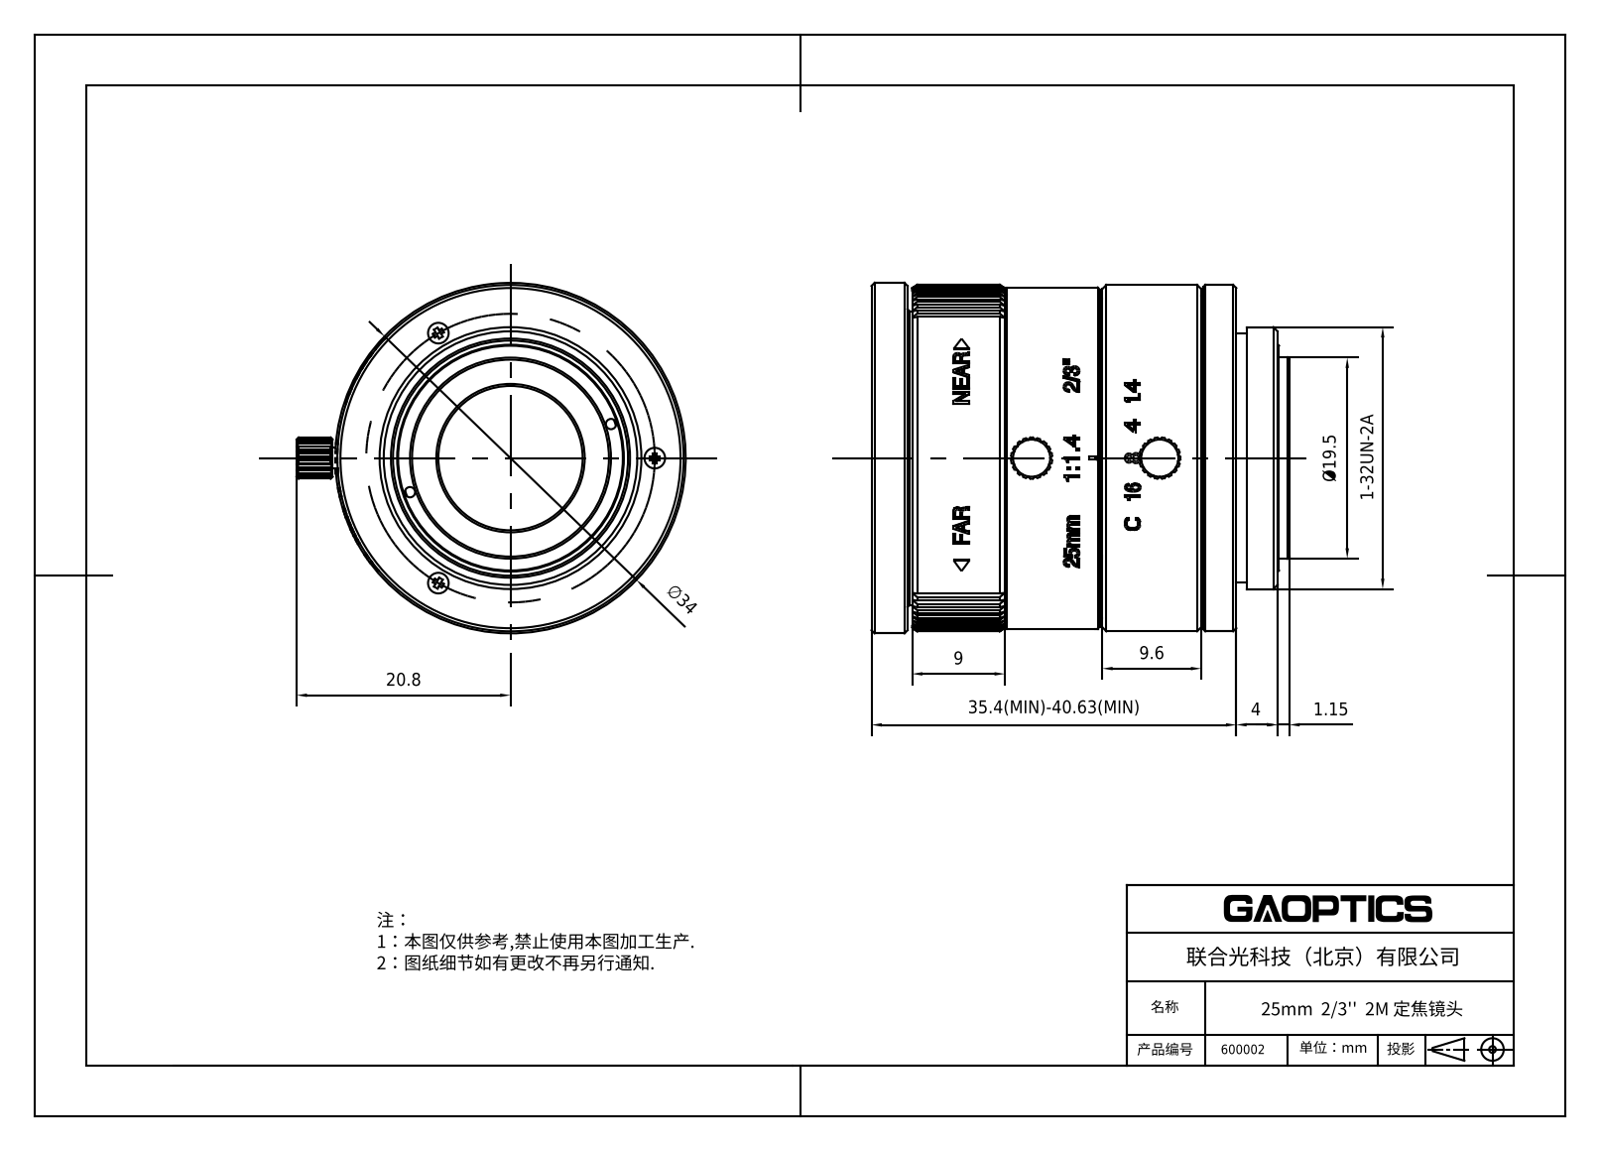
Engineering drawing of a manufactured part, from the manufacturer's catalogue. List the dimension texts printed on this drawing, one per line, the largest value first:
35.4(MIN)-40.63(MIN)
∅34
20.8
Ø19.5
9.6
9
4
1.15
1-32UN-2A
